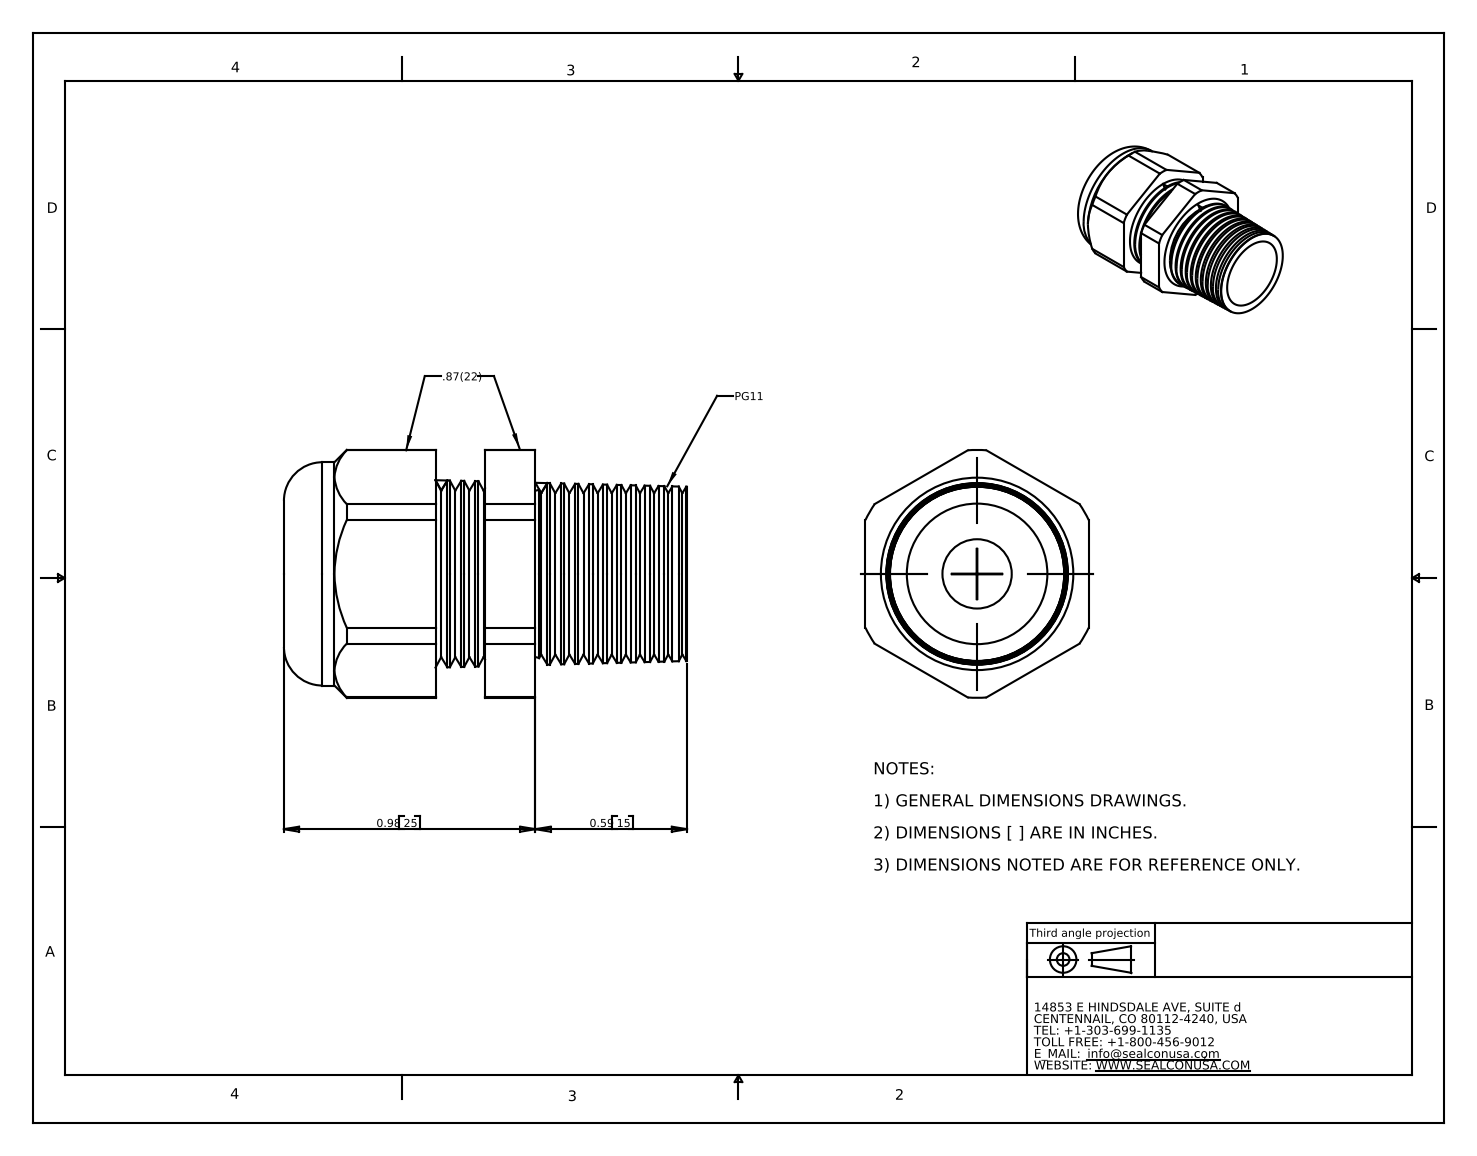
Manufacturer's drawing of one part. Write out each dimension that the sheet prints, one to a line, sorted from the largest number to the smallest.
0.98 25
0.59 15
